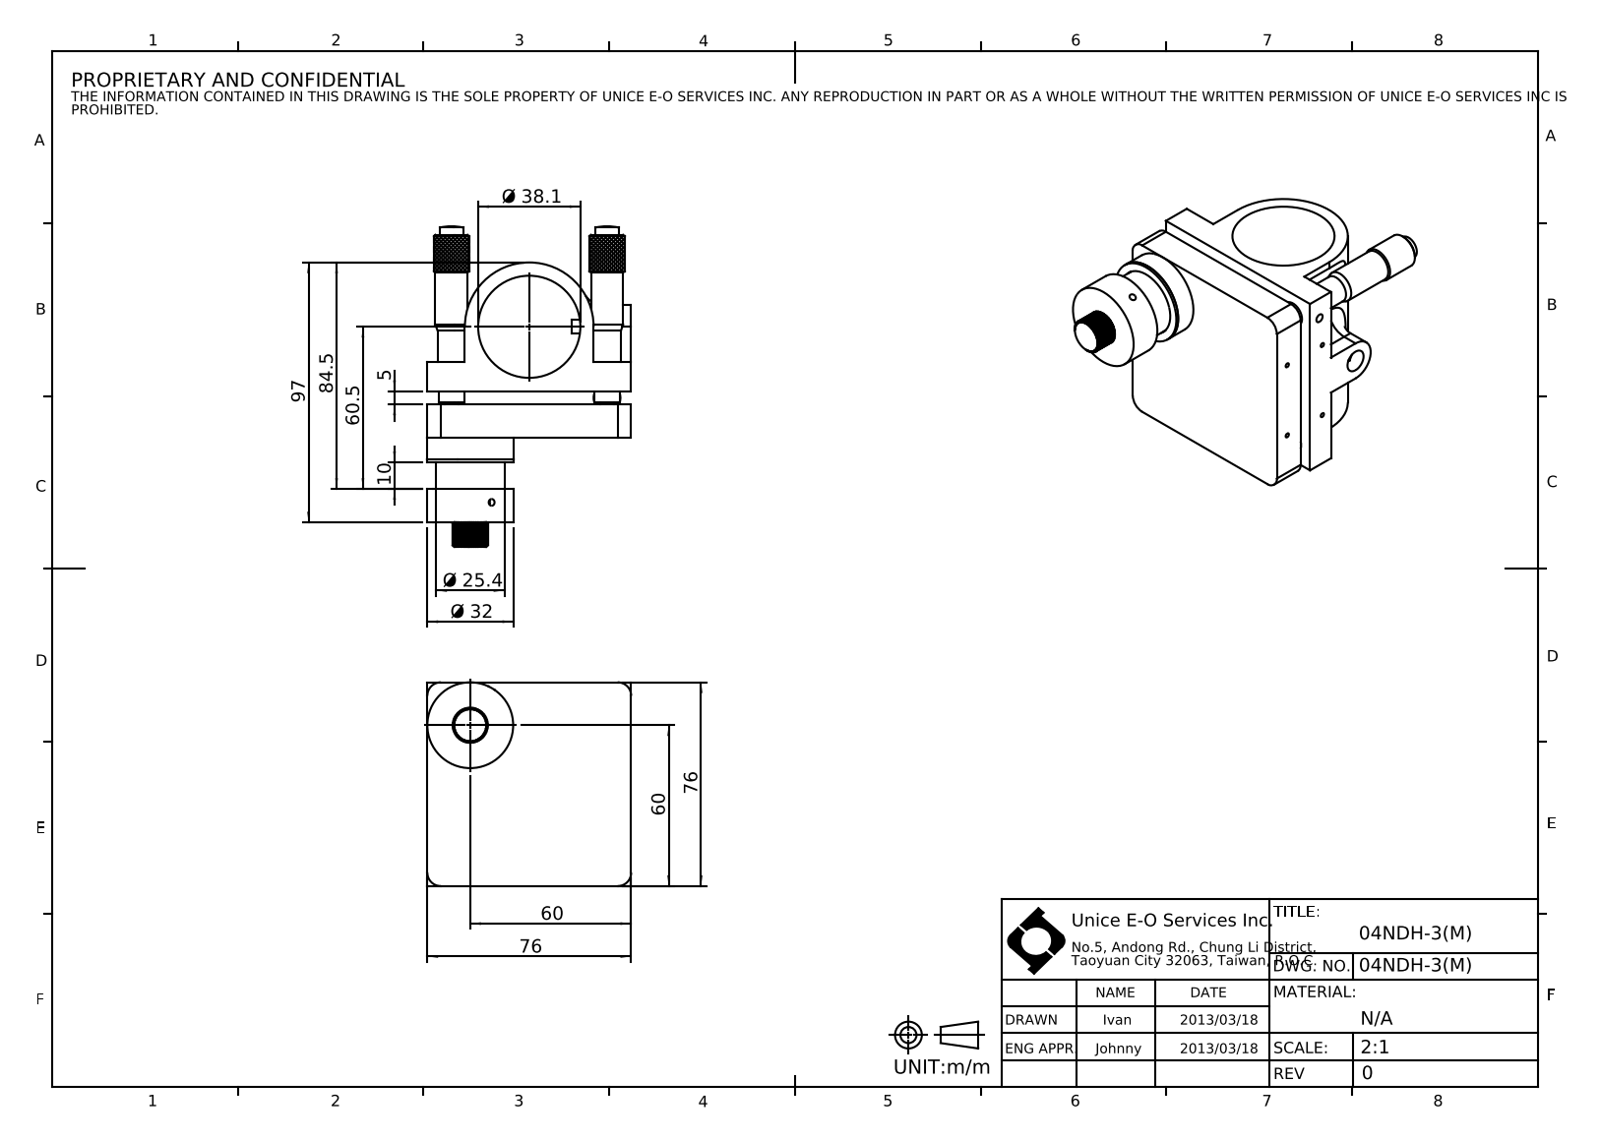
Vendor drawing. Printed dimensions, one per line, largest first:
97
84.5
76
76
60.5
60
60
Ø 38.1
Ø 32
Ø 25.4
10
5
